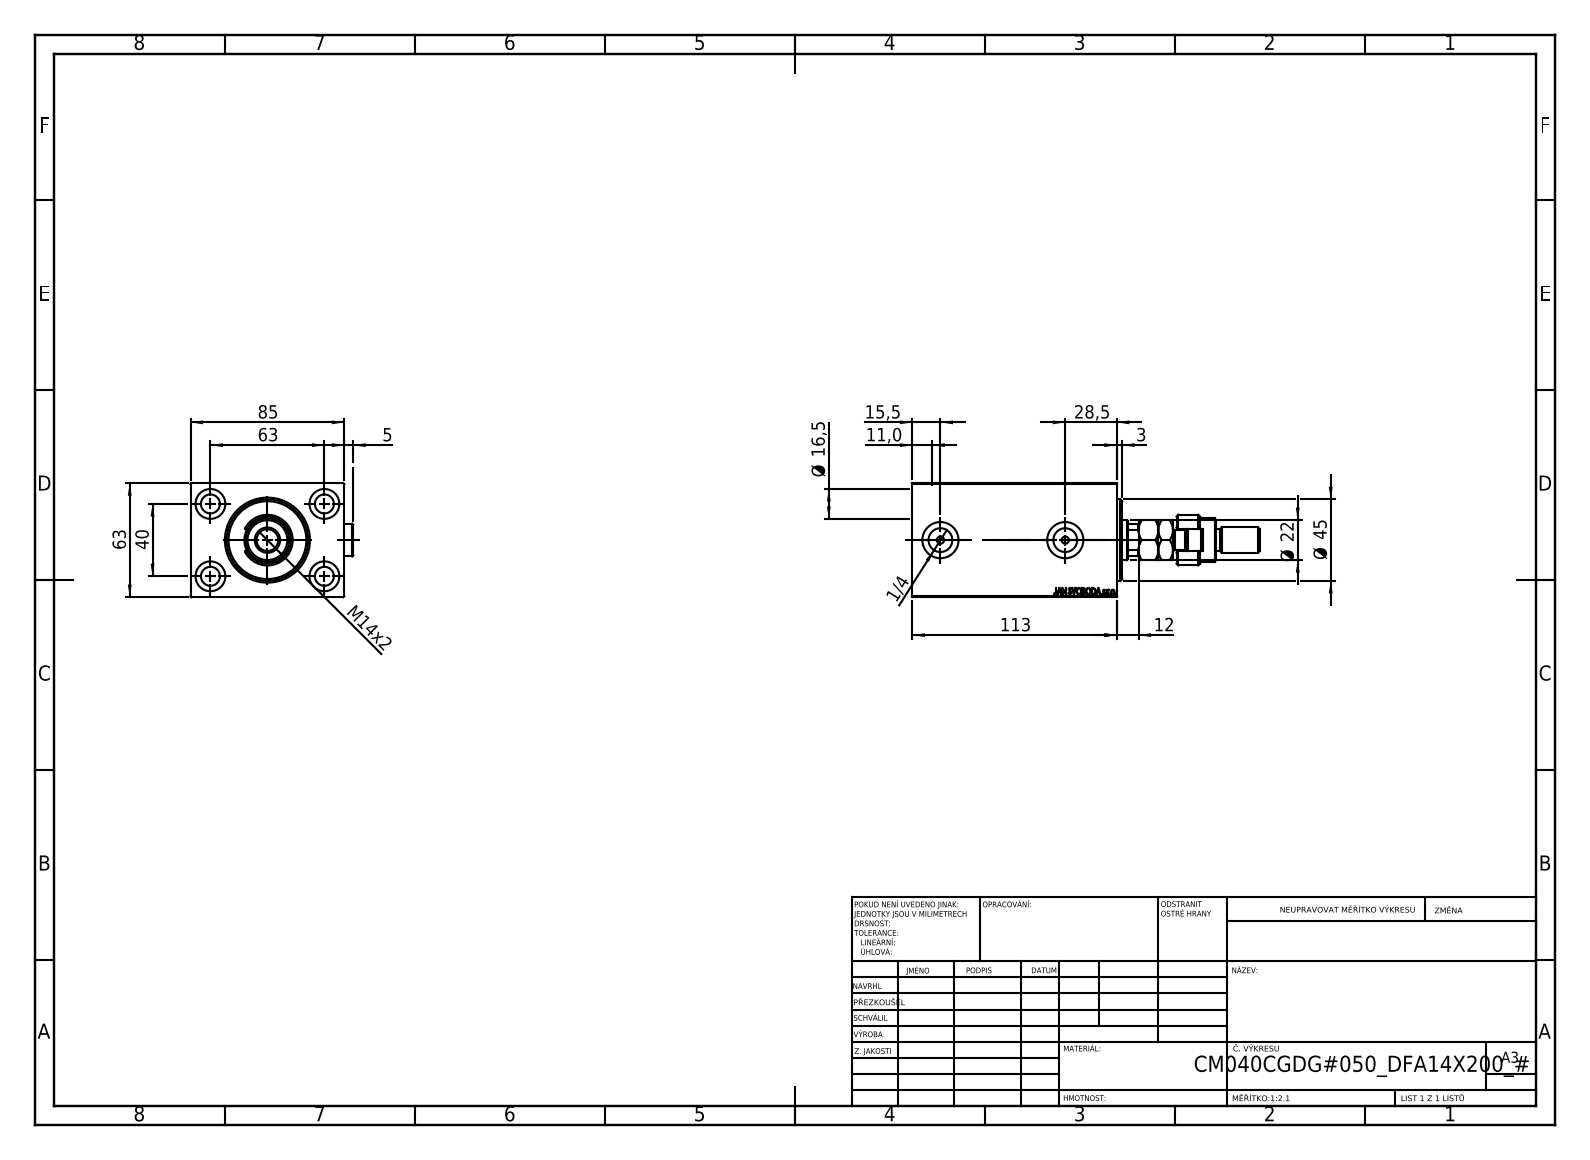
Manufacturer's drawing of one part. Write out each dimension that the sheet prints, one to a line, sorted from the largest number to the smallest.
113
85
63
63
Ø 45
40
28,5
Ø 22
Ø 16,5
15,5
M14x2
12
11,0
5
3
1/4
